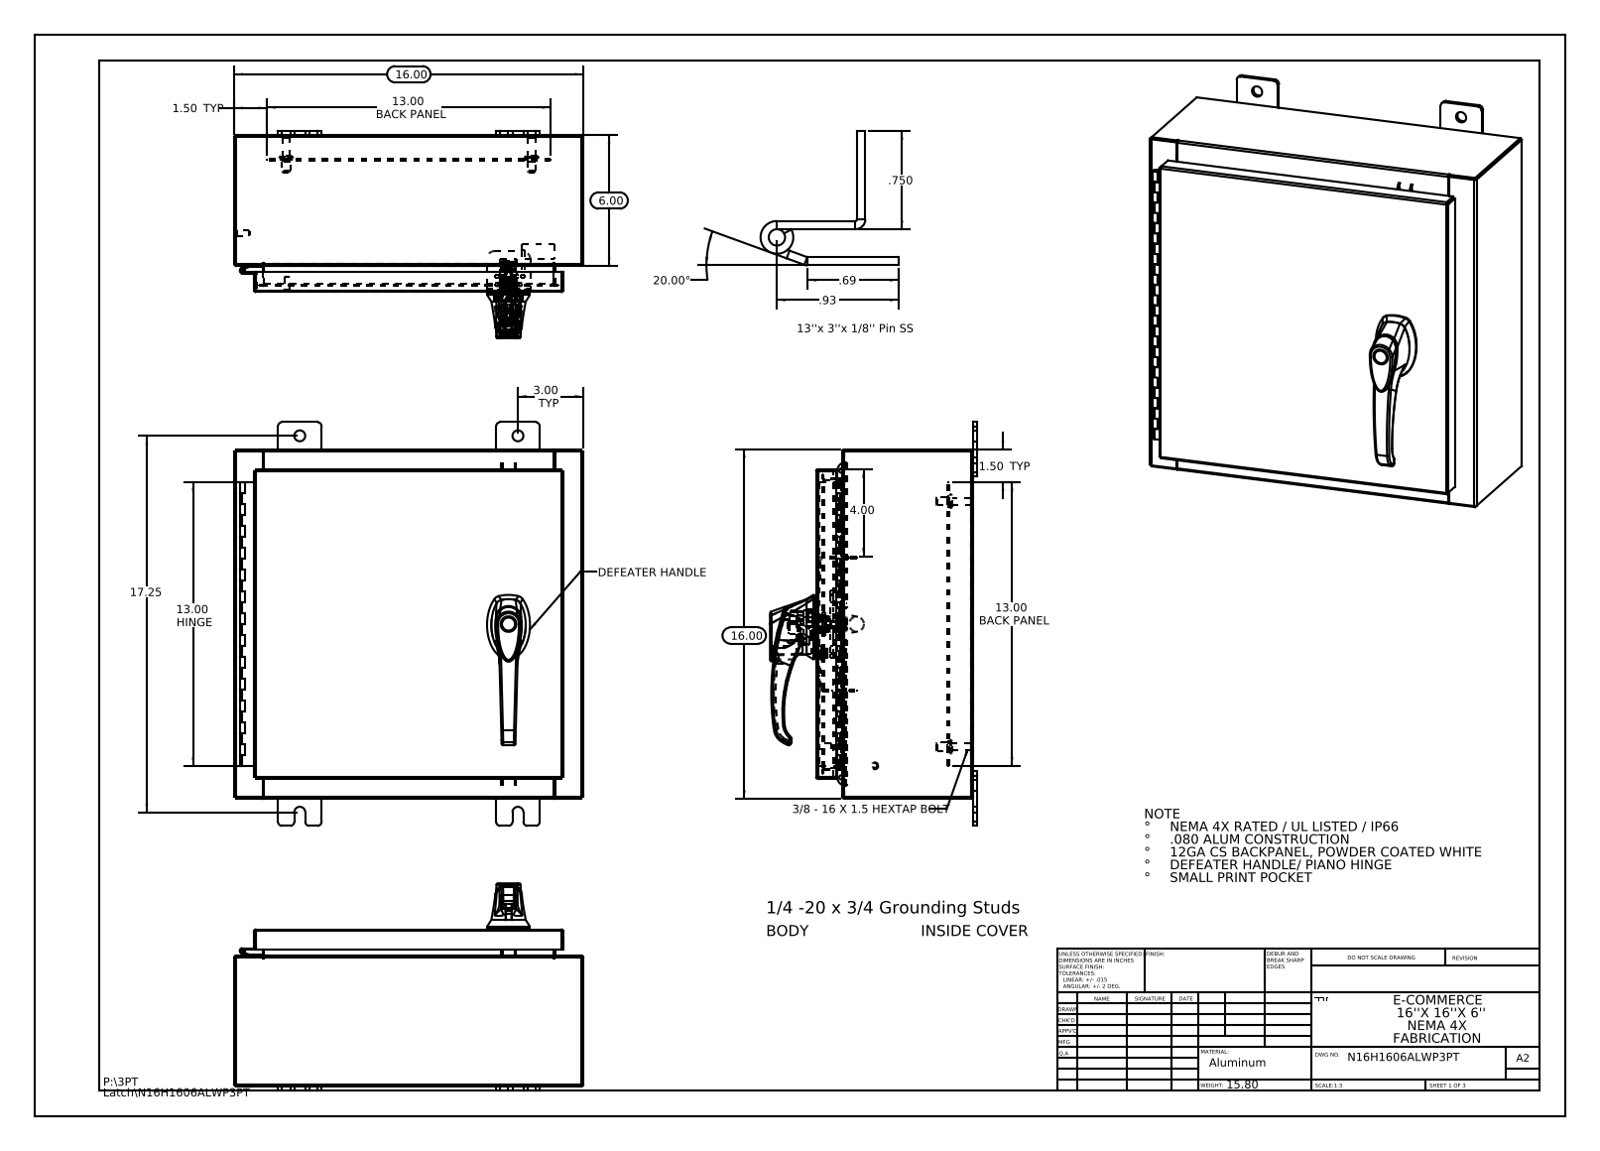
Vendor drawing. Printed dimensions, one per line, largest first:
20.00°
17.25
16.00
16.00
13.00 HINGE
13.00 BACK PANEL
13.00 BACK PANEL
6.00
4.00
3.00 TYP
1.50 TYP
1.50 TYP
.93
.750
.69
